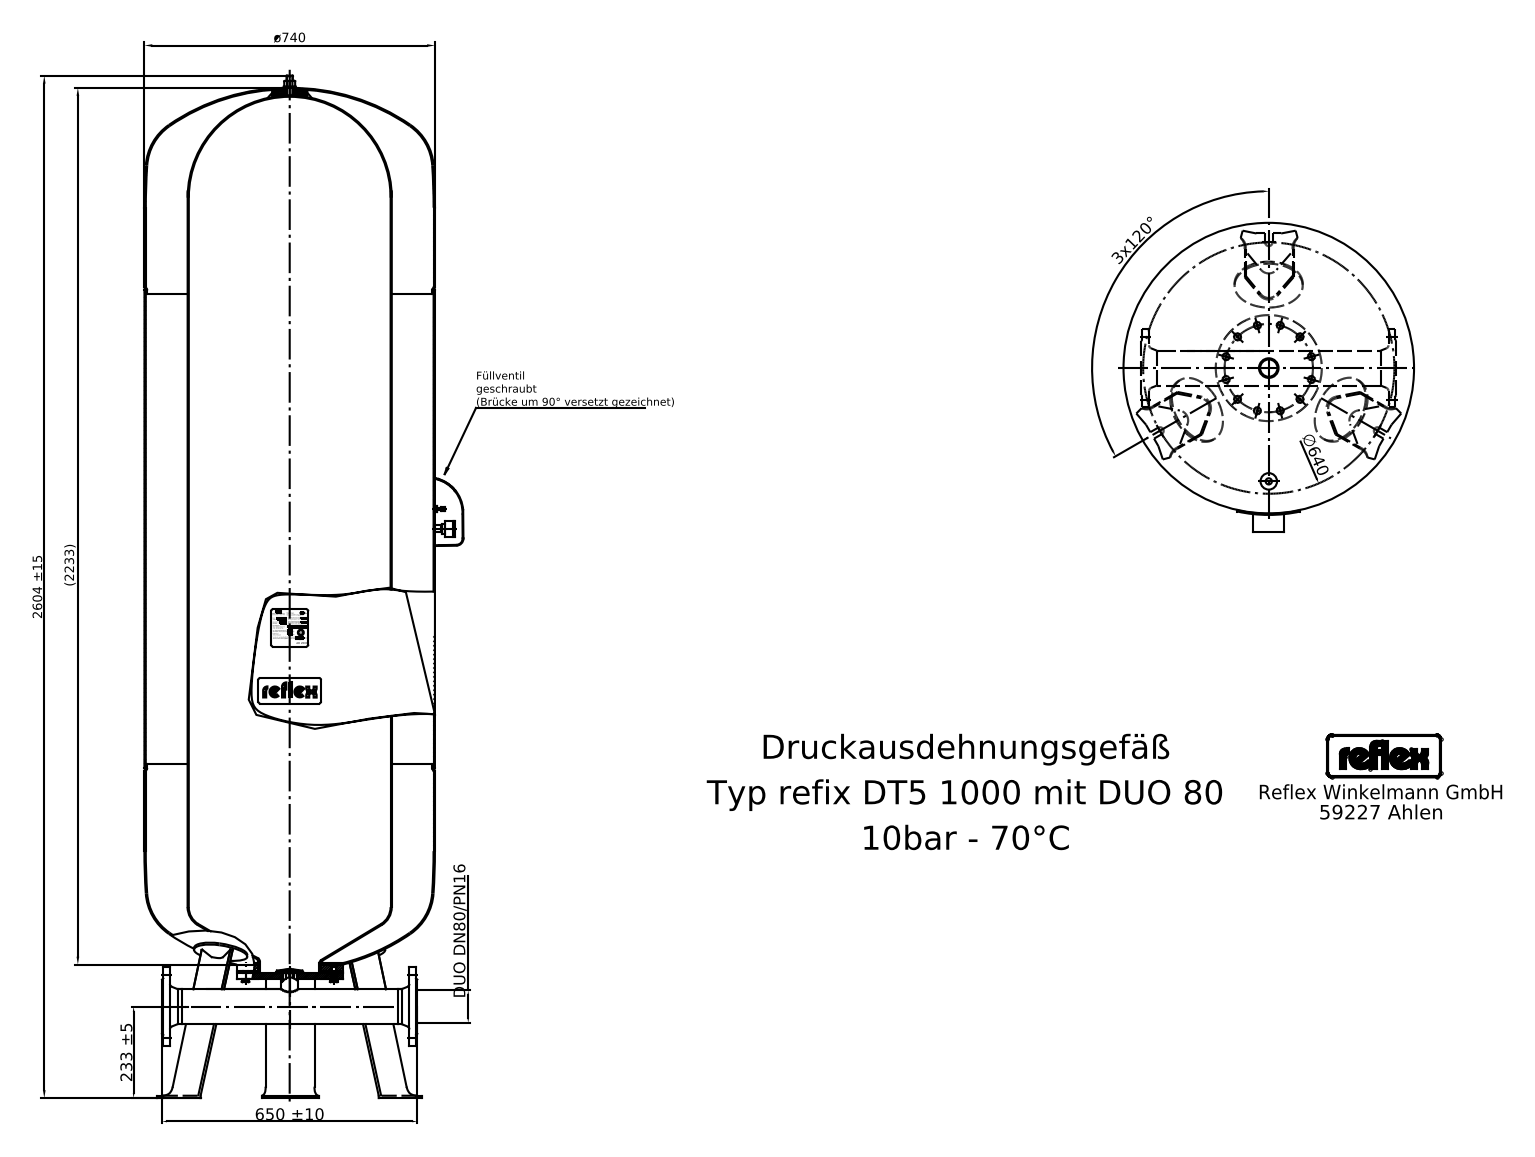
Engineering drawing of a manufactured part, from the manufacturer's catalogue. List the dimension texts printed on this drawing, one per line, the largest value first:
2604 ±15
(2233)
ø740
650 ±10
∅640
233 ±5
3x120°
DUO DN80/PN16
